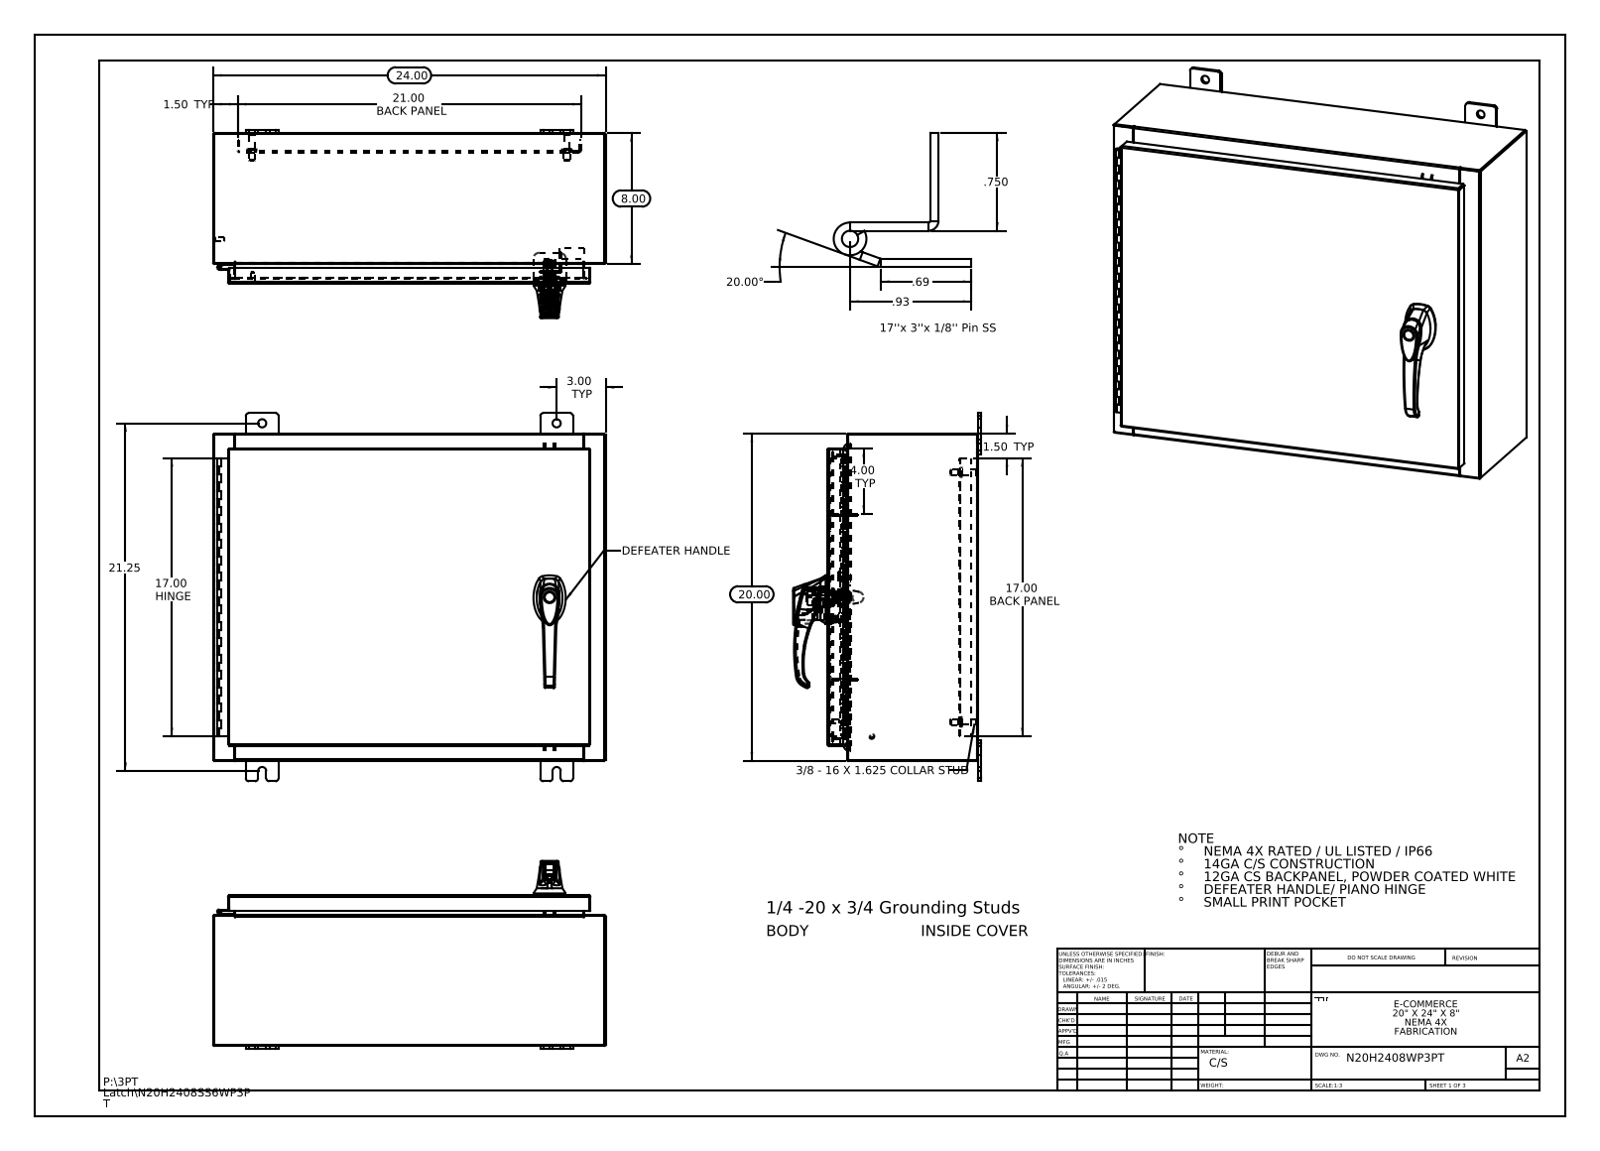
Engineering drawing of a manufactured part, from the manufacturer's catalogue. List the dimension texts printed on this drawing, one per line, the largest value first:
24.00
21.25
21.00 BACK PANEL
20.00
20.00°
17.00 HINGE
17.00 BACK PANEL
8.00
4.00 TYP
3.00 TYP
1.50 TYP
1.50 TYP
.93
.750
.69
